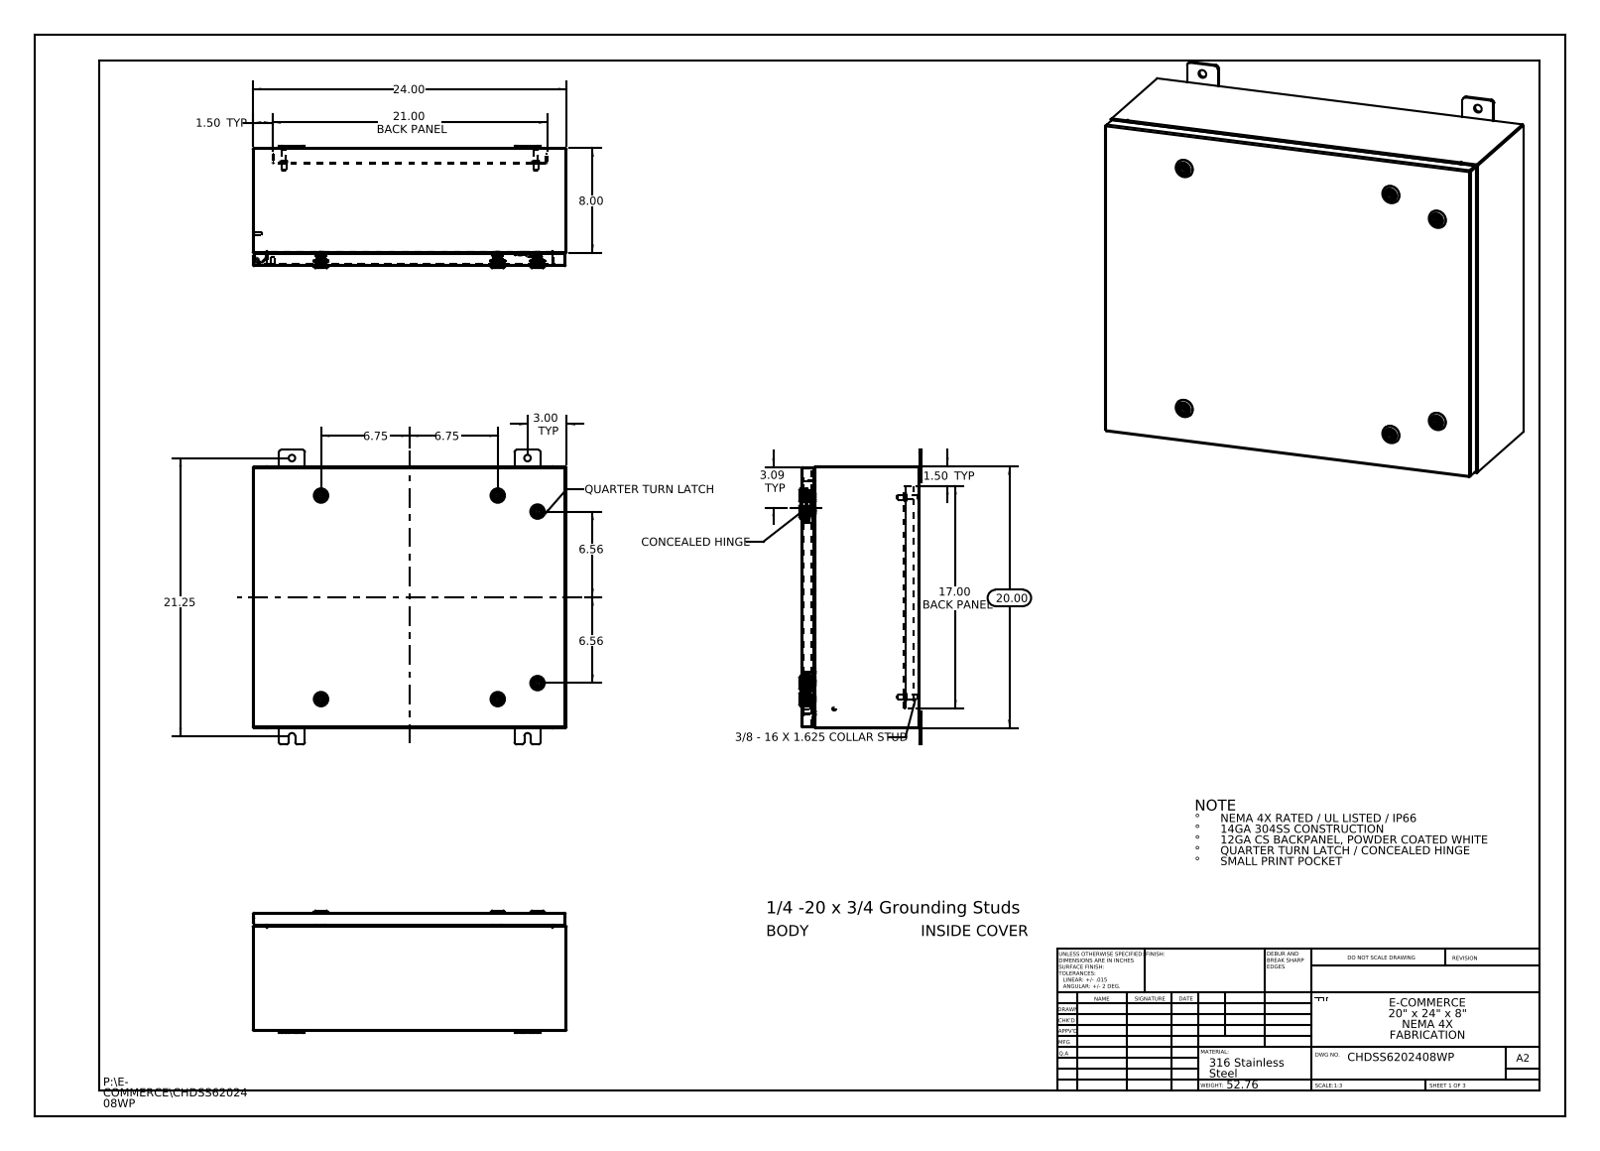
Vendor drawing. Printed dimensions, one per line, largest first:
24.00
21.25
21.00 BACK PANEL
20.00
17.00 BACK PANEL
8.00
6.75
6.75
6.56
6.56
3.09 TYP
3.00 TYP
1.50 TYP
1.50 TYP
